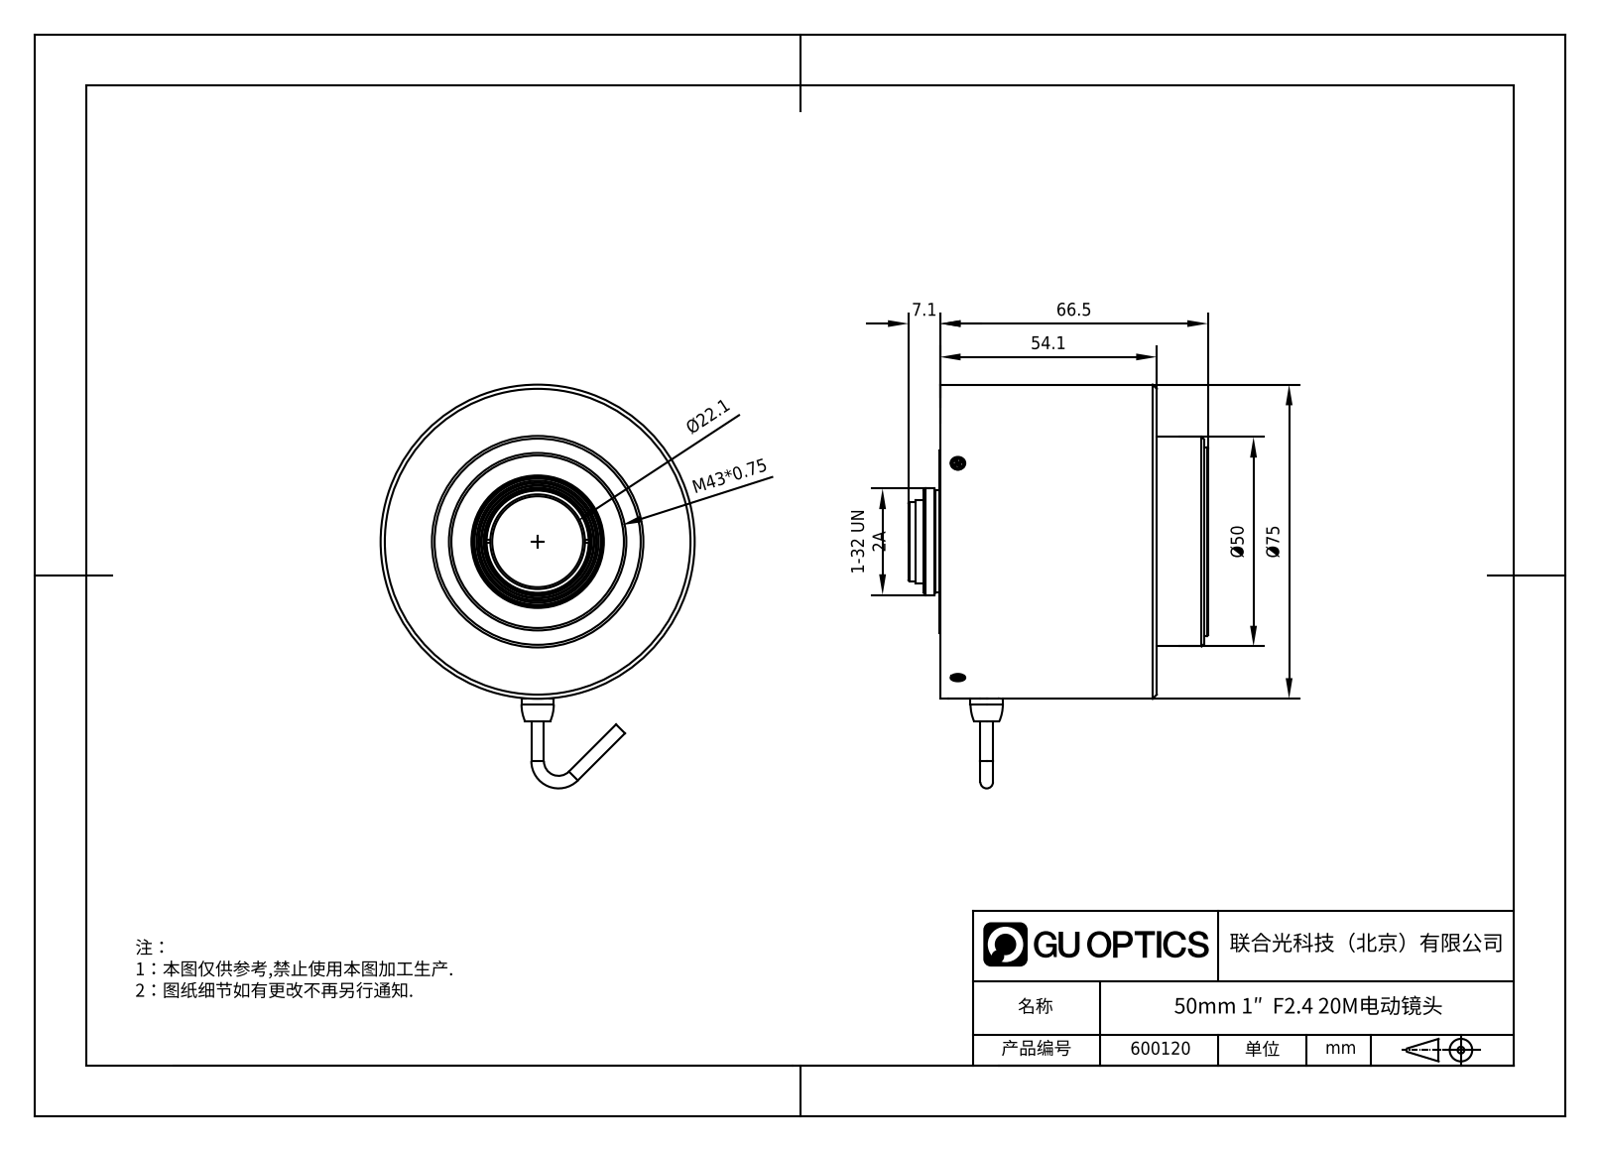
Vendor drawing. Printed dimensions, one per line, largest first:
Ø75
66.5
54.1
Ø50
M43*0.75
Ø22.1
7.1
1-32 UN 2A
